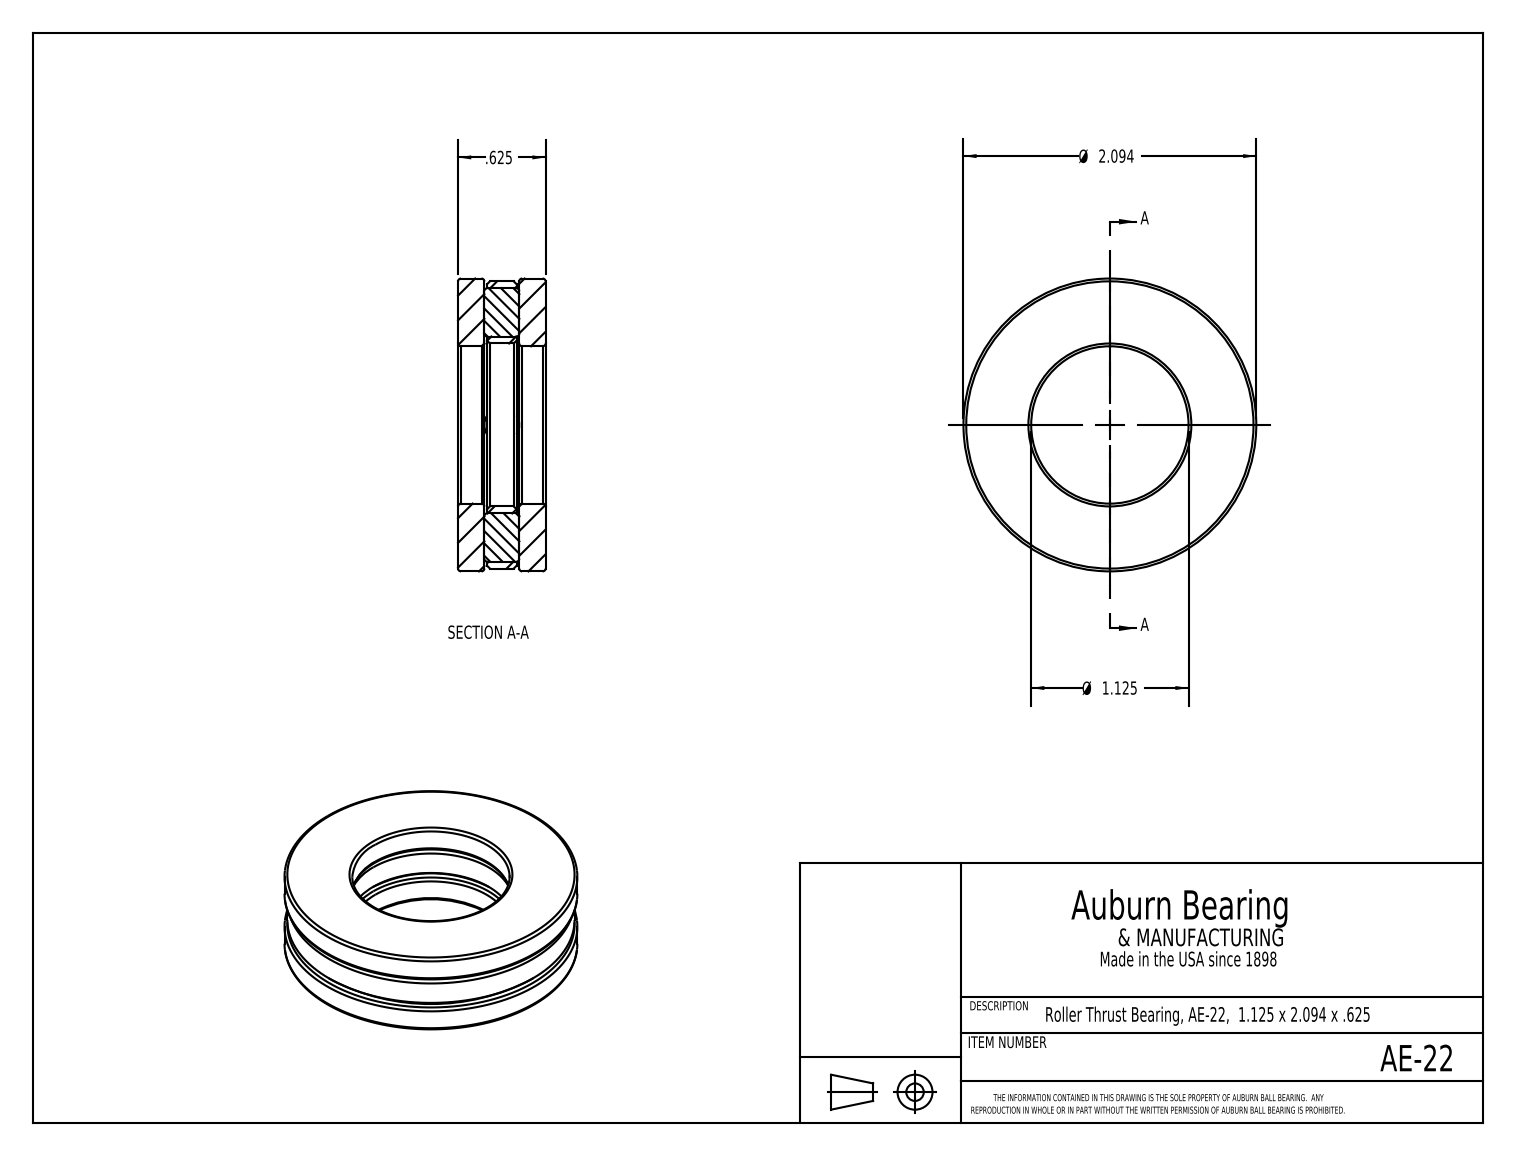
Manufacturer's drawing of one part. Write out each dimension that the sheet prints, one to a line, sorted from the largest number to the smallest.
Ø 2.094
Ø 1.125
.625
